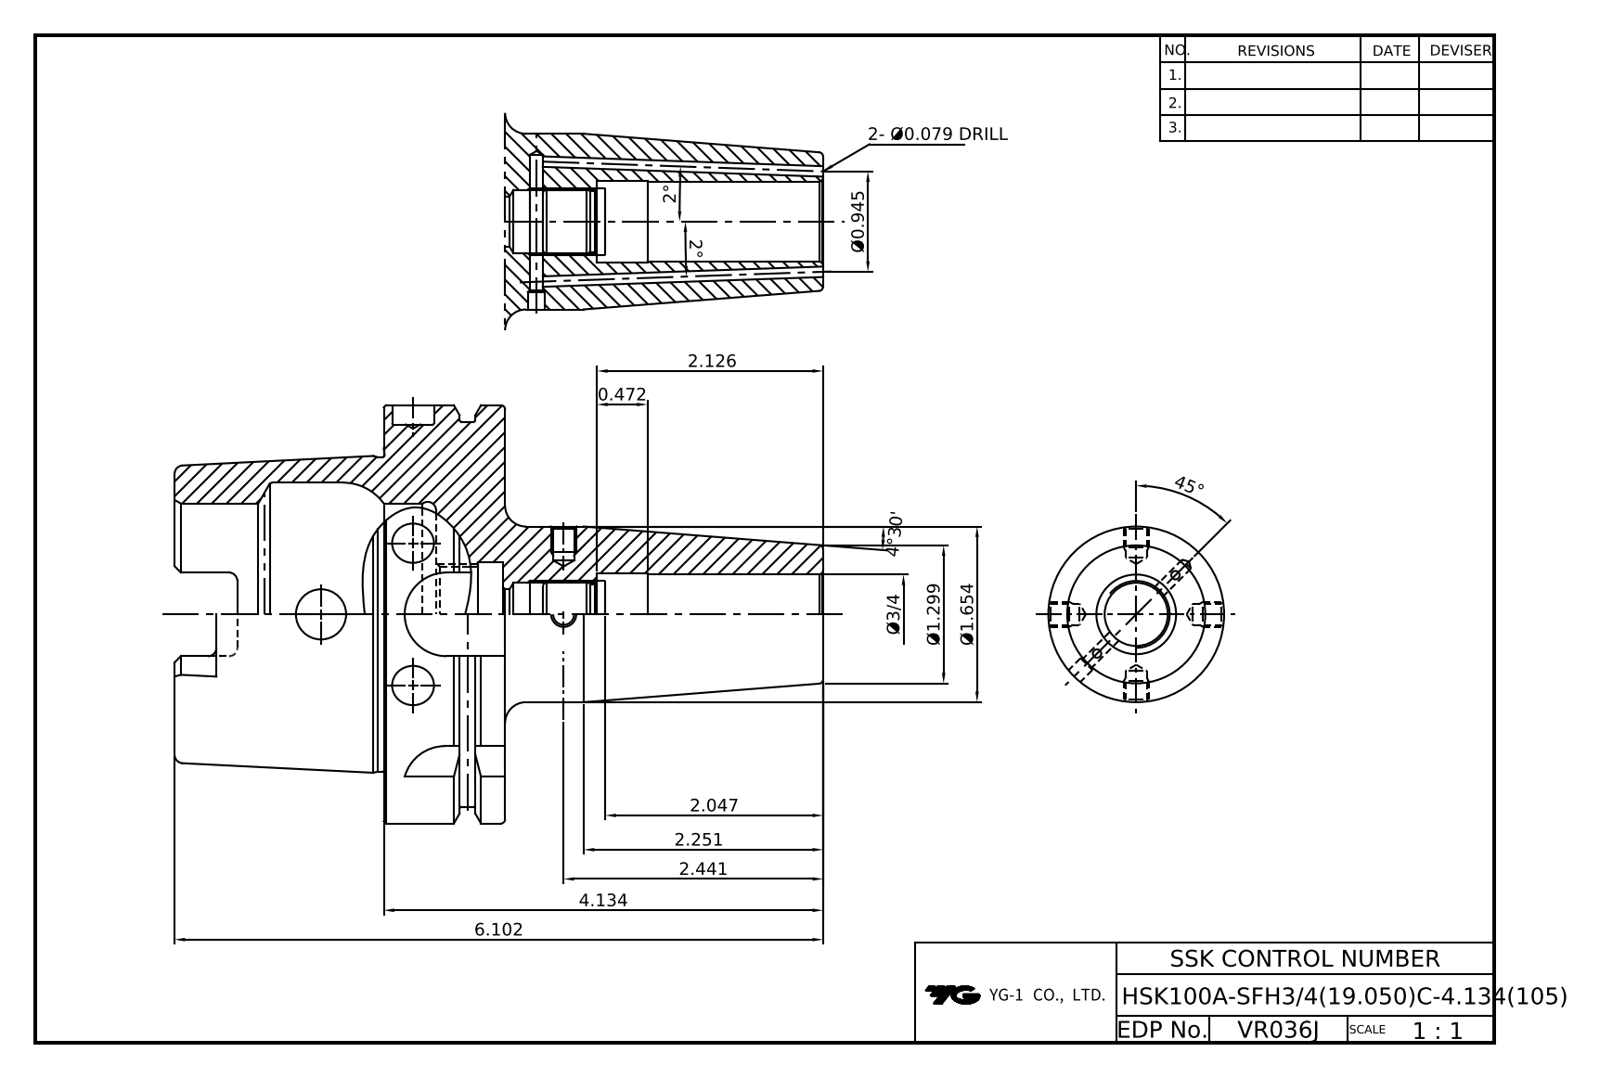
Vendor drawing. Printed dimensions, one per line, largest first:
45°
6.102
4.134
2.441
2.251
2.126
2.047
2°
2°
Ø1.654
Ø1.299
Ø0.945
0.472
